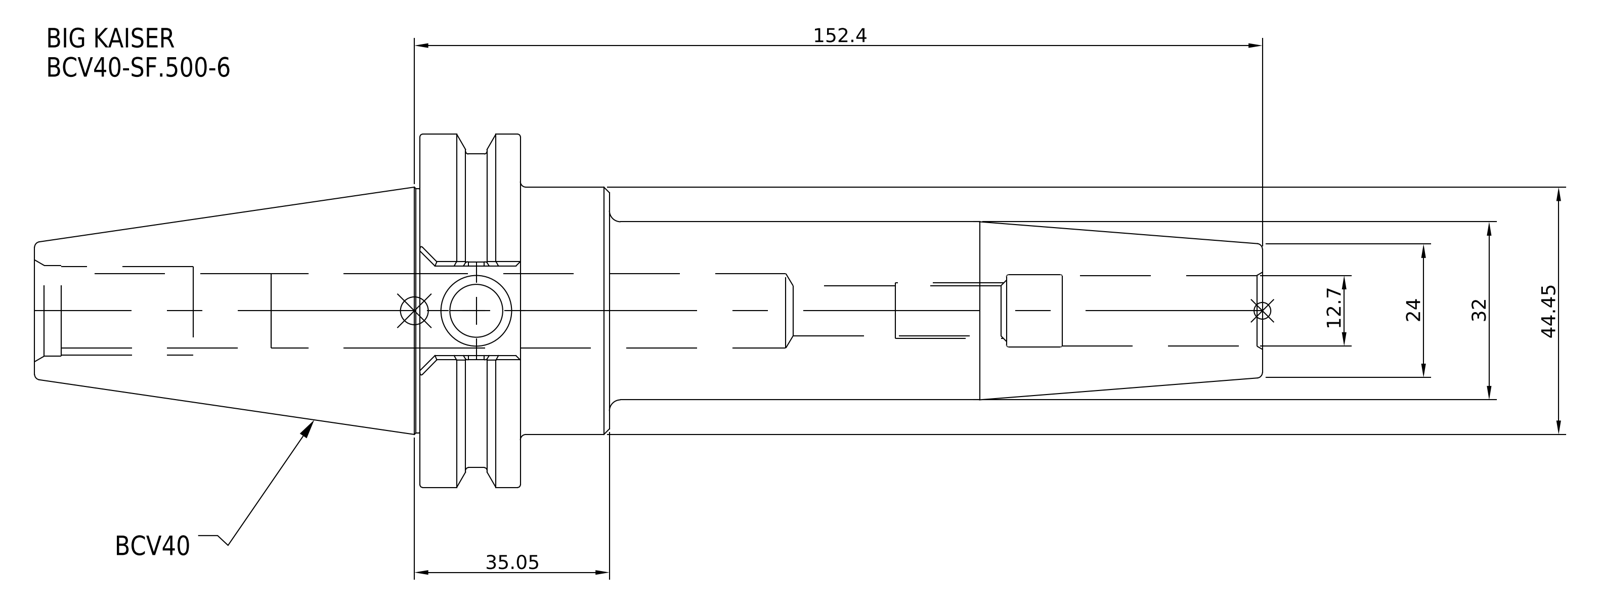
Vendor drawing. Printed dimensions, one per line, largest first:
152.4
44.45
35.05
32
24
12.7
